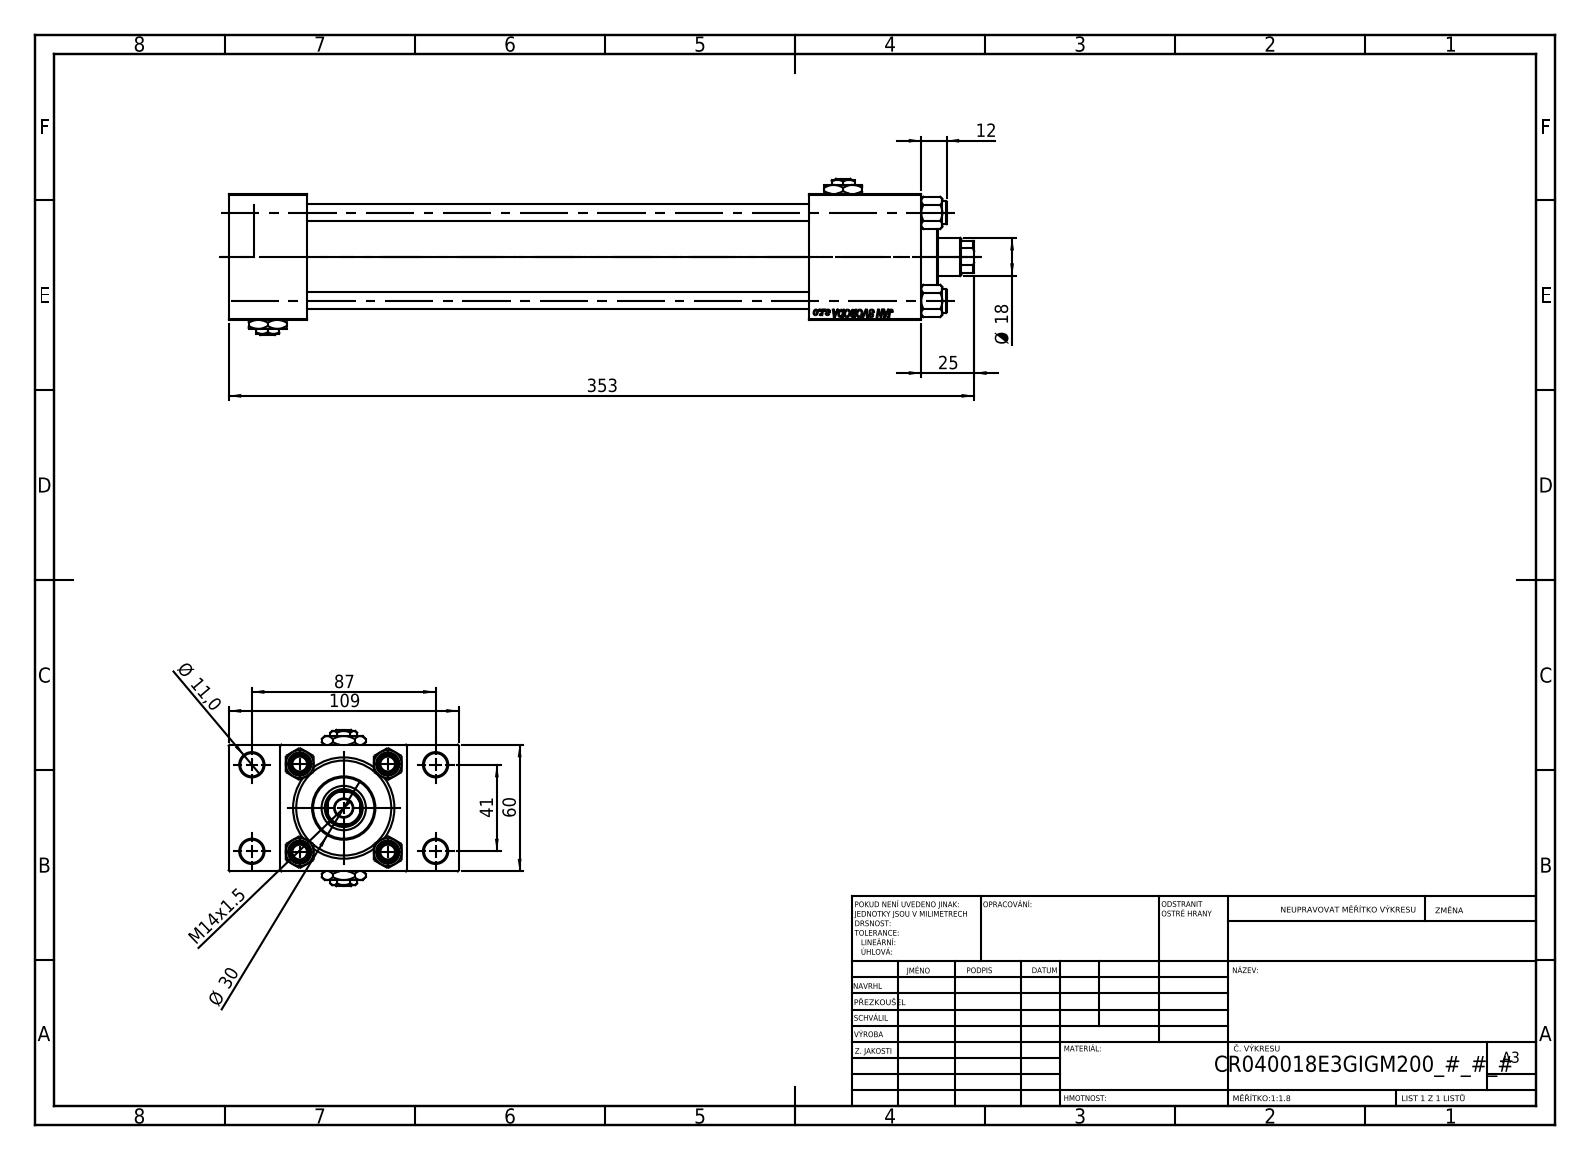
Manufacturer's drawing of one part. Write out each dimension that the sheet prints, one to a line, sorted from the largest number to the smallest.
353
109
87
60
41
Ø 30
25
Ø 18
M14x1.5
12
Ø 11,0
